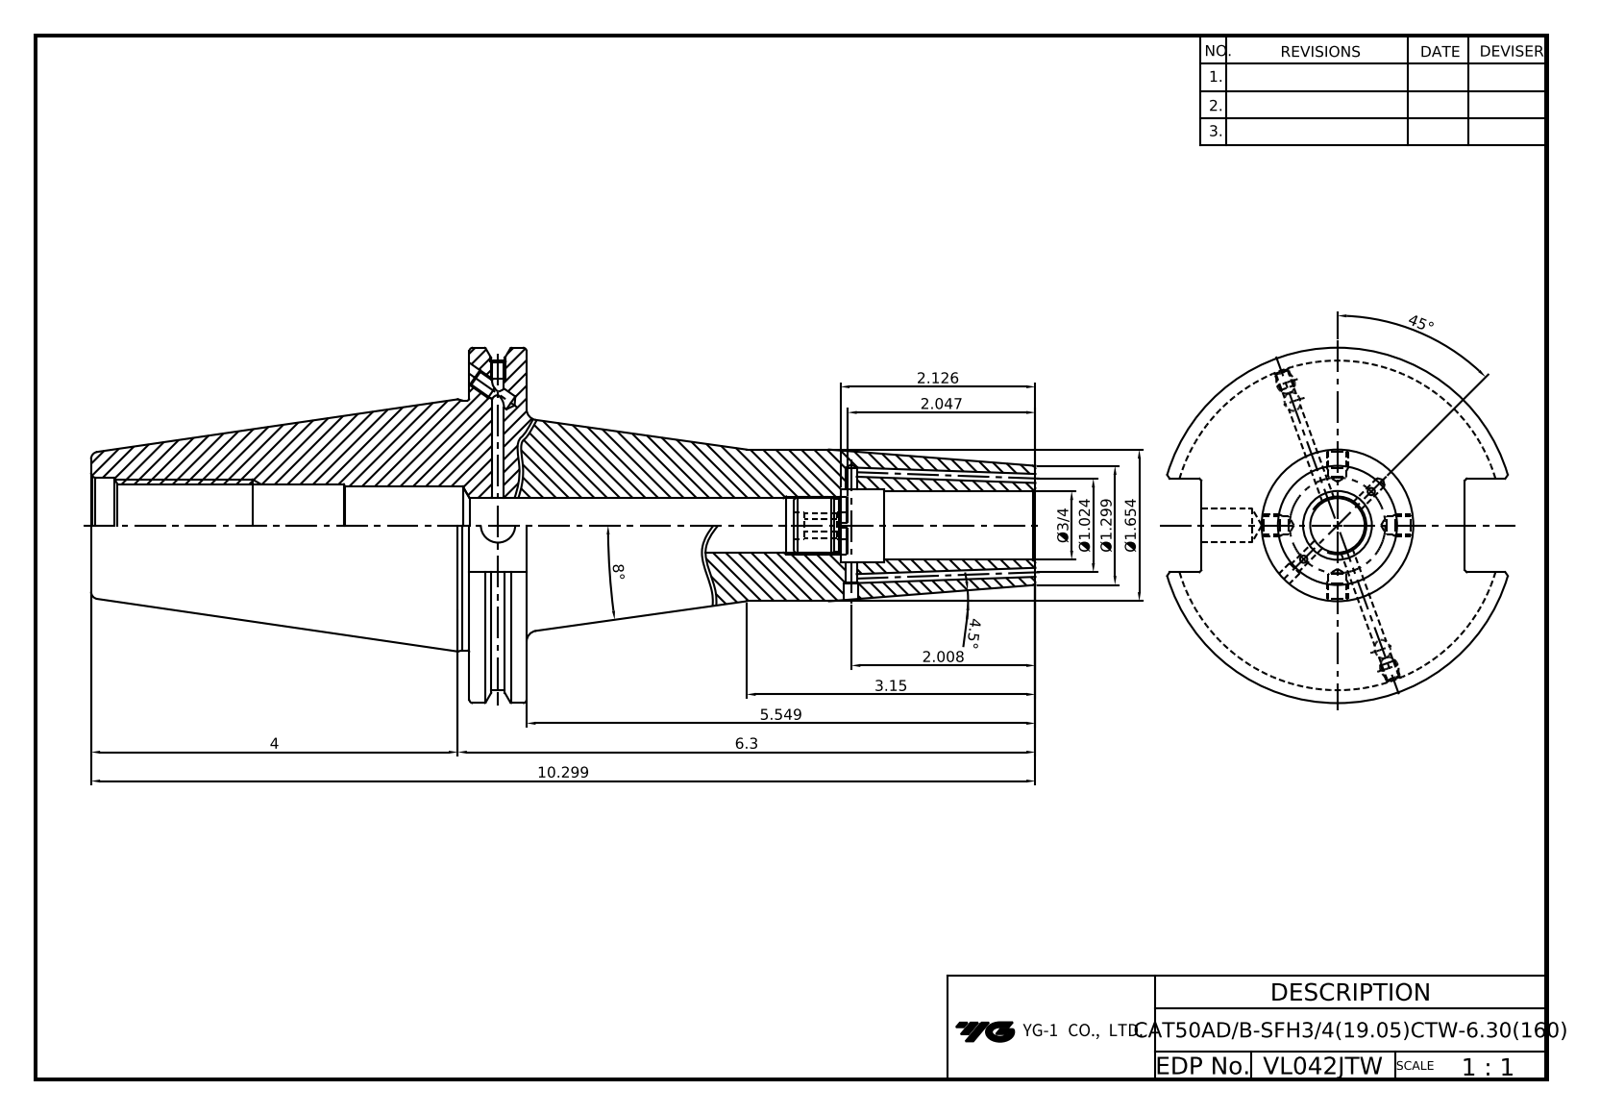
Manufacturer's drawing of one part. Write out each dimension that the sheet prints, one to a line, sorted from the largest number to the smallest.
45°
10.299
8°
6.3
5.549
4.5°
4
3.15
2.126
2.047
2.008
Ø1.654
Ø1.299
Ø1.024
Ø3/4
